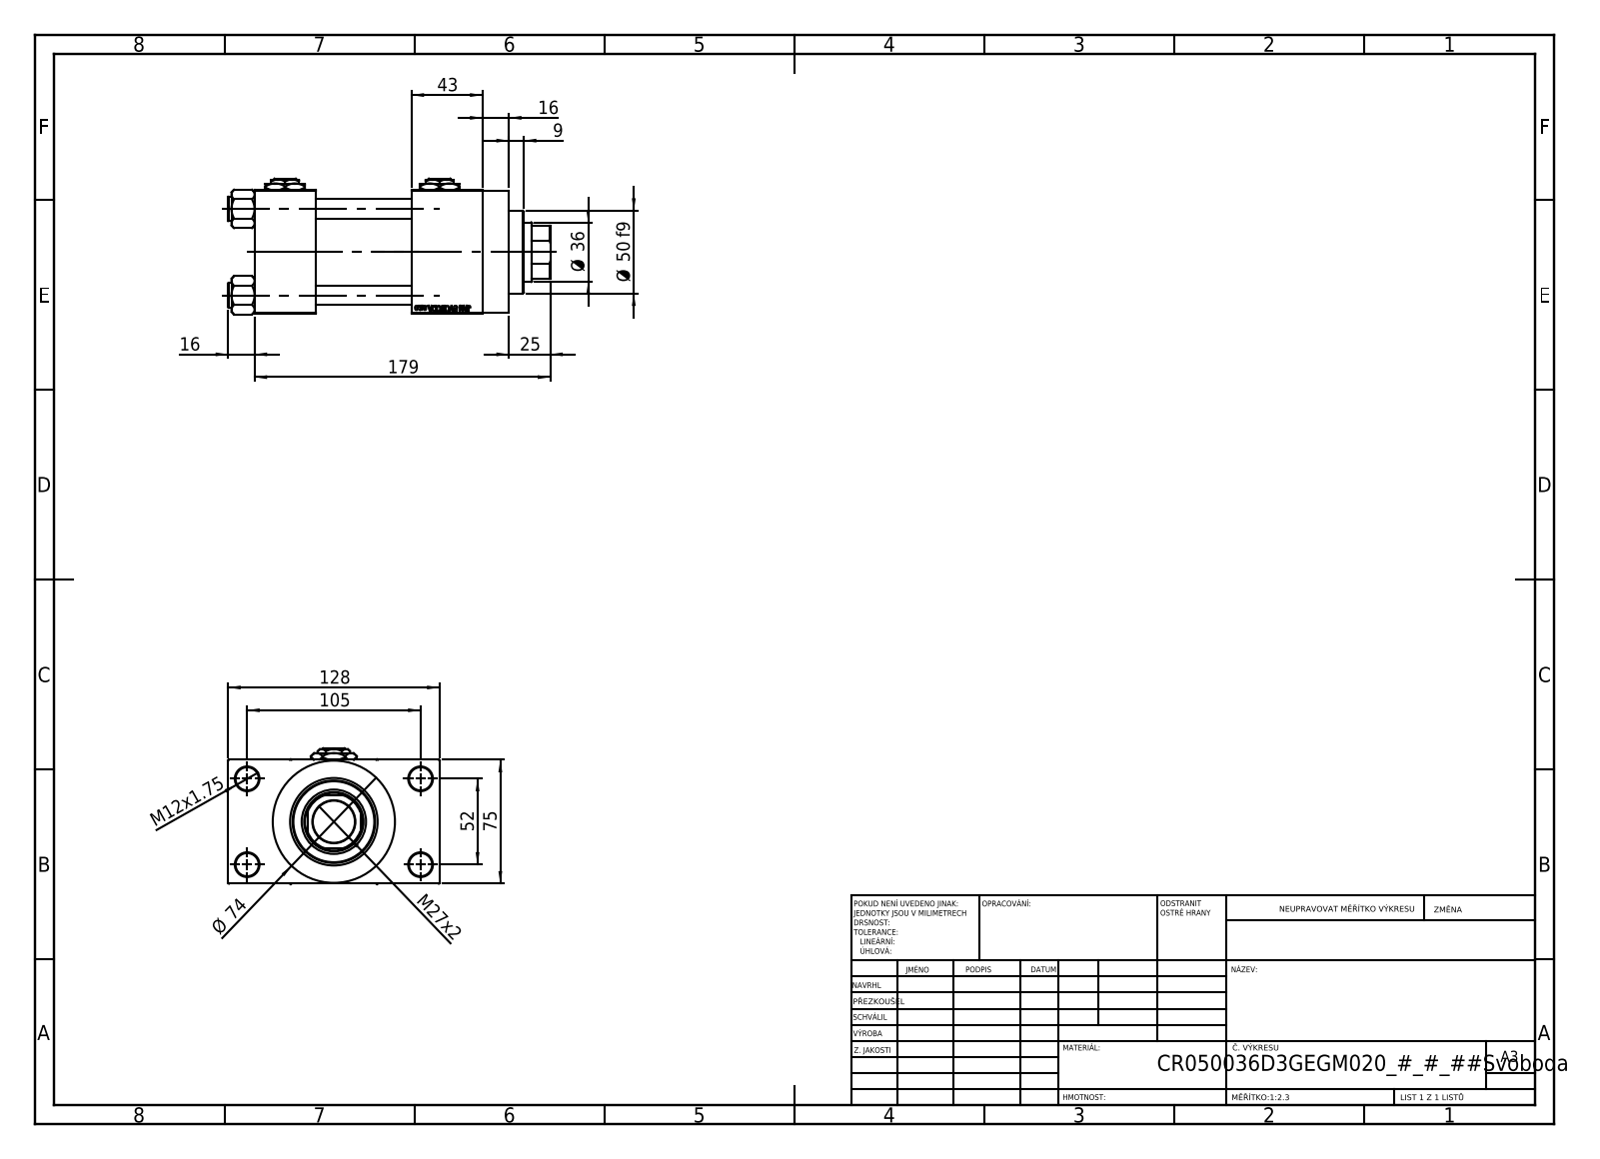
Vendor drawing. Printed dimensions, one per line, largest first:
179
128
105
75
Ø 74
52
Ø 50 f9
43
Ø 36
M27x2
25
16
16
M12x1.75
9
